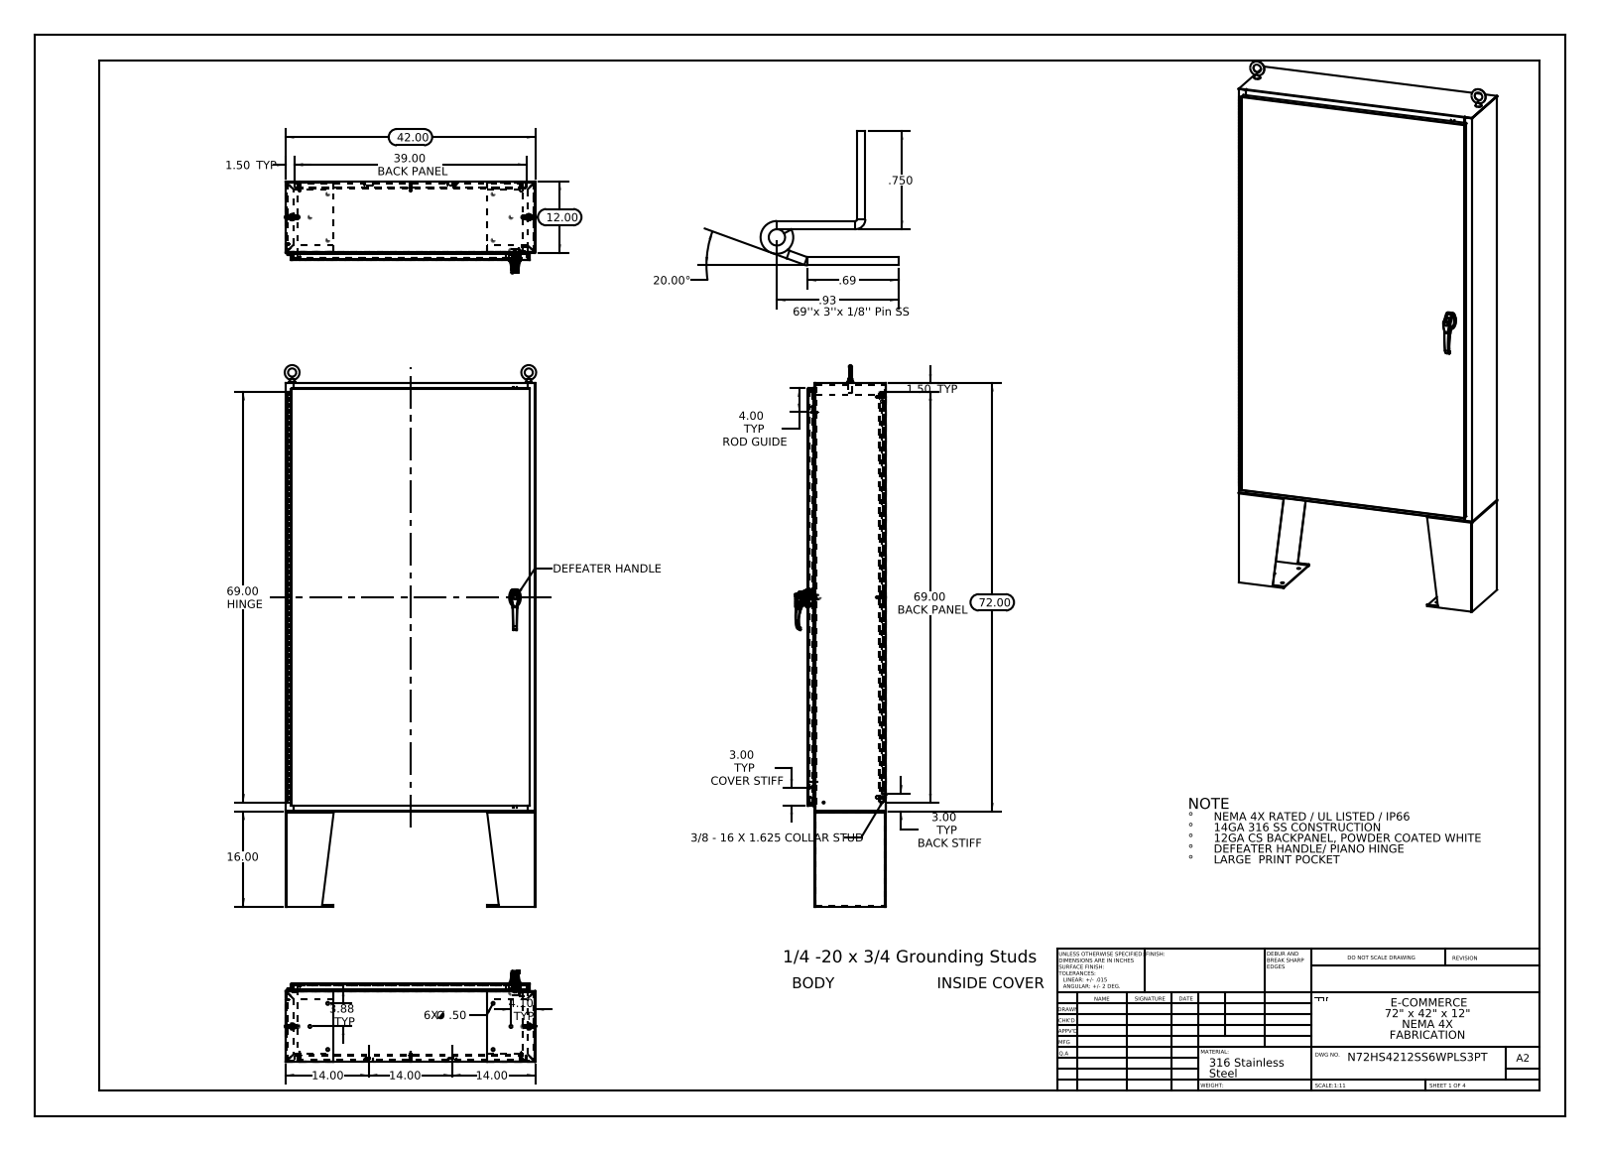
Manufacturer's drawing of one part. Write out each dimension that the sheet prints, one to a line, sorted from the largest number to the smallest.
72.00
69.00 HINGE
69.00 BACK PANEL
42.00
39.00 BACK PANEL
20.00°
16.00
14.00
14.00
14.00
12.00
4.10 TYP
4.00 TYP ROD GUIDE
3.88 TYP
3.00 TYP COVER STIFF
3.00 TYP BACK STIFF
1.50 TYP
1.50 TYP
.93
.750
.69
6X Ø .50
